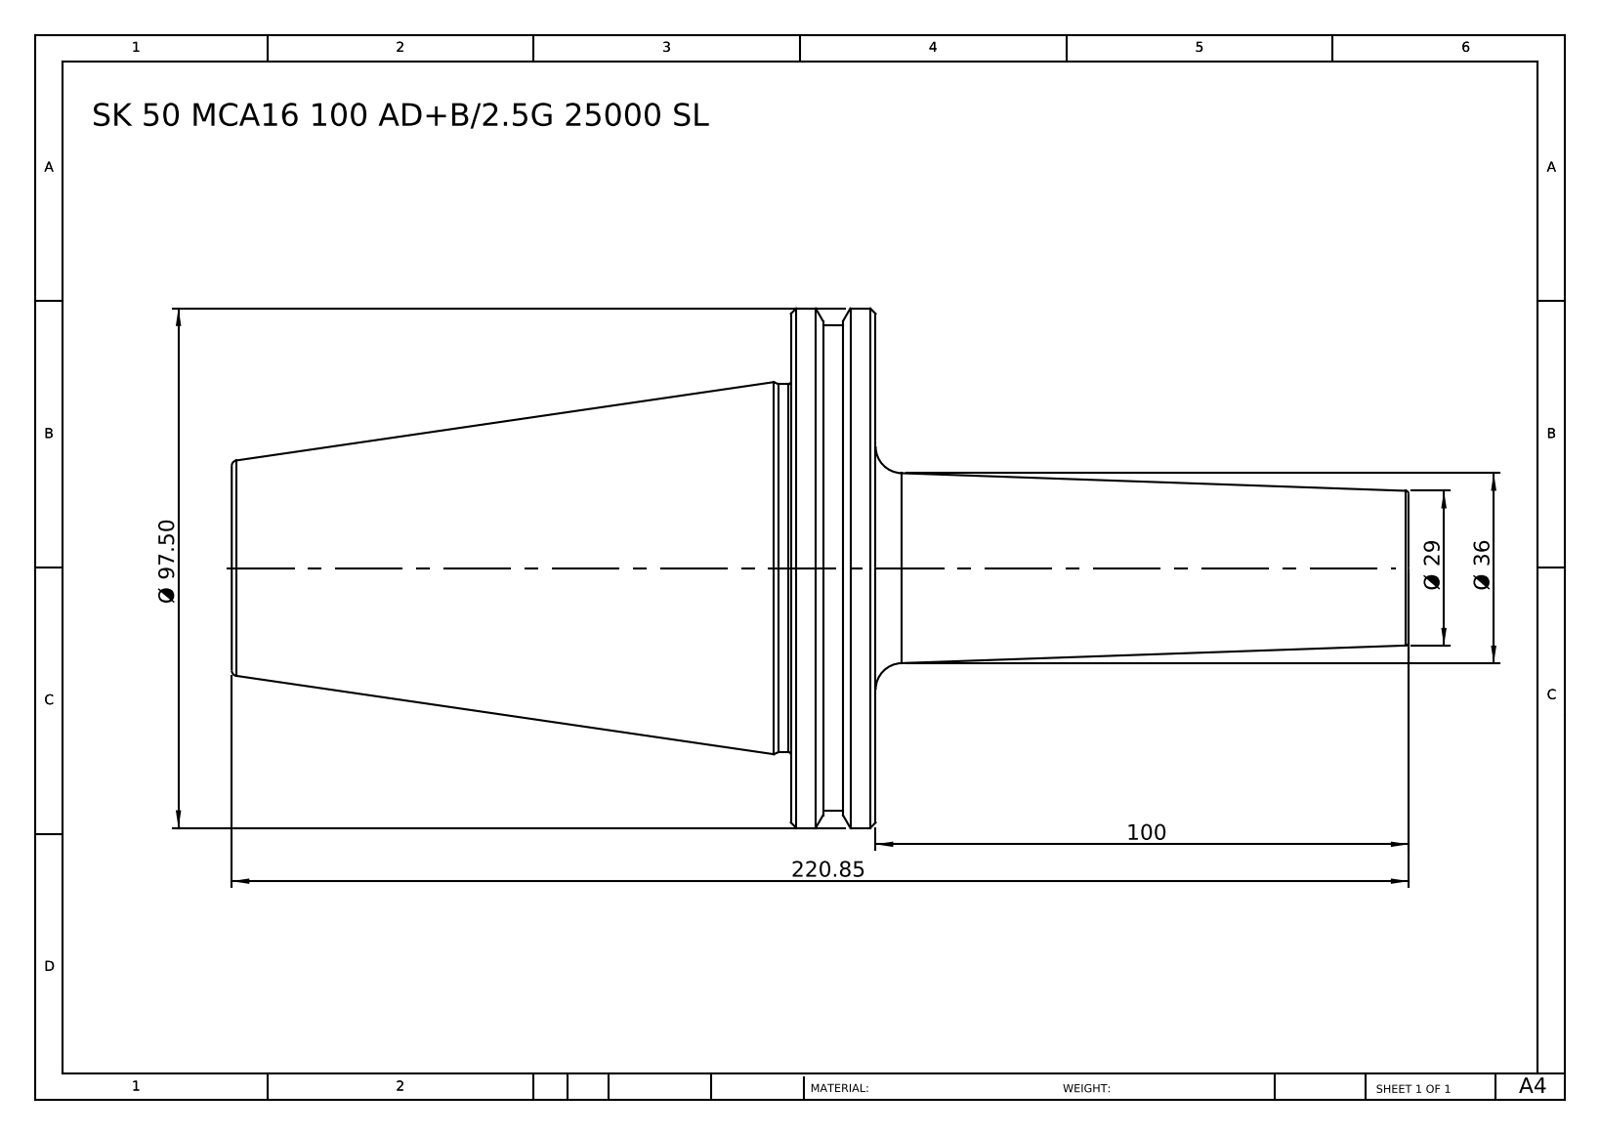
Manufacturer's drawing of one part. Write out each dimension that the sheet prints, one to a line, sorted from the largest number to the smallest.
220.85
100
Ø 97.50
Ø 36
Ø 29
